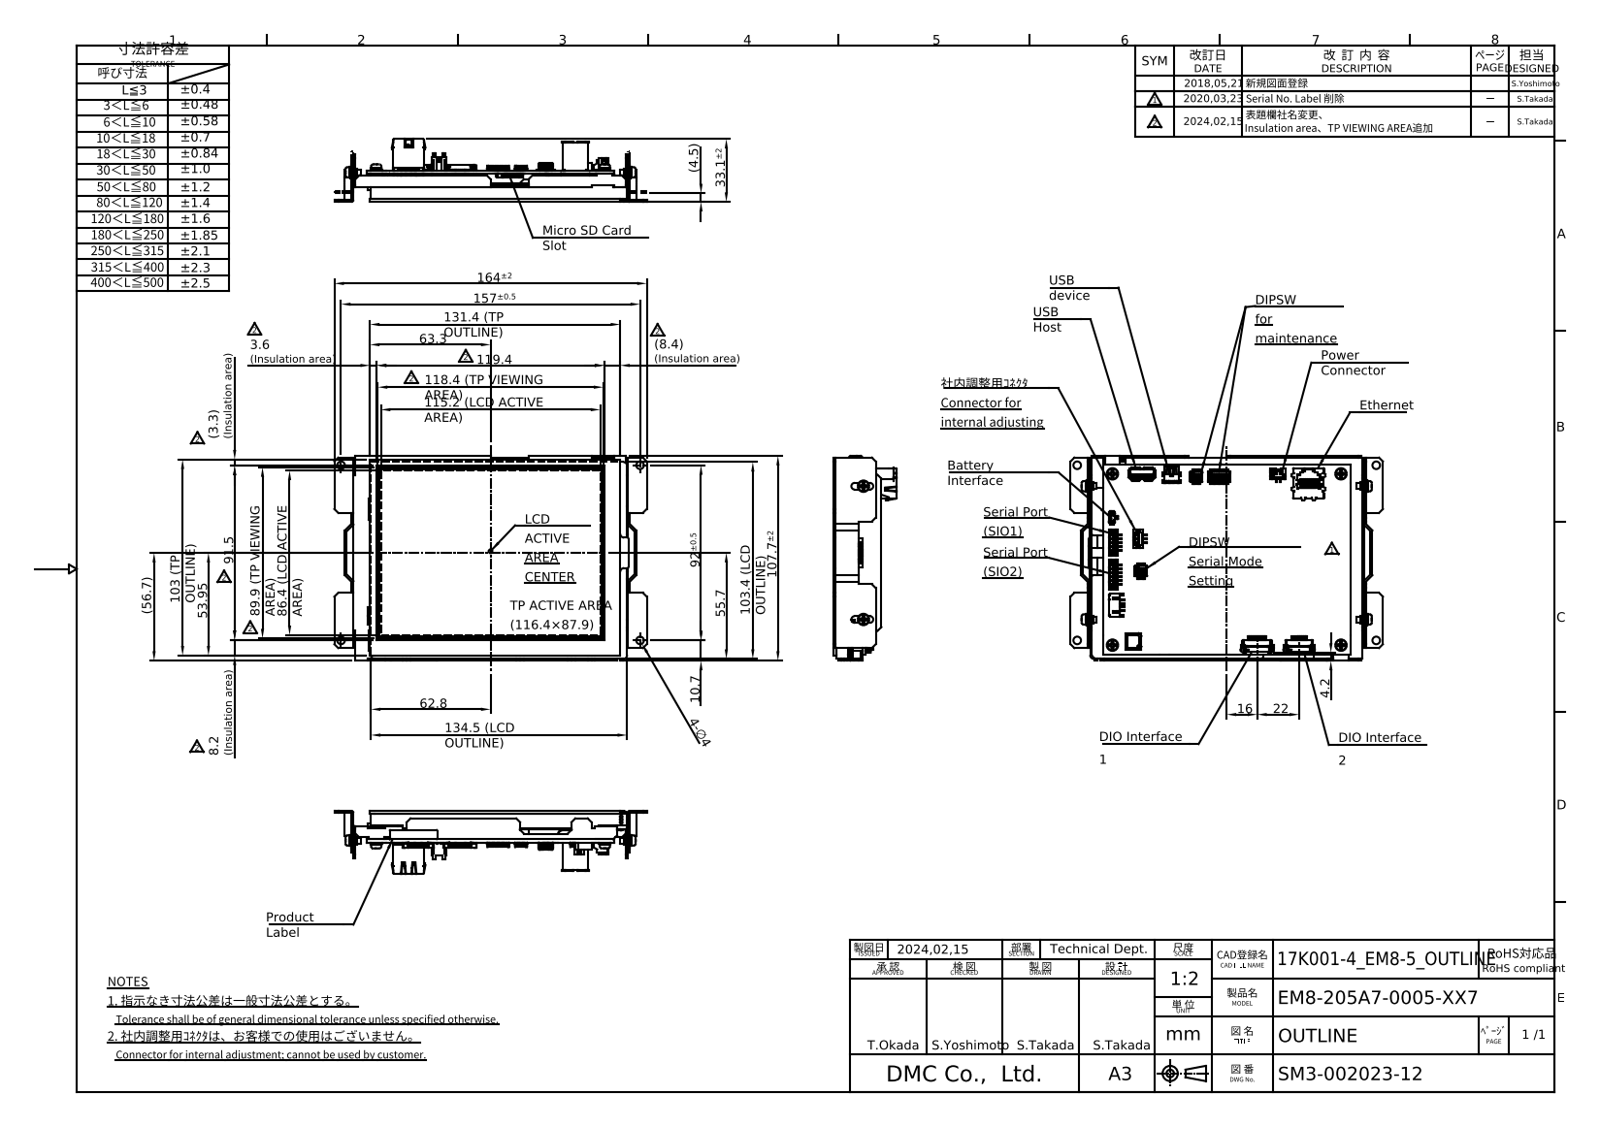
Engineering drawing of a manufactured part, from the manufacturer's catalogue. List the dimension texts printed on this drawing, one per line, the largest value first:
164±2
157±0.5
134.5 (LCD OUTLINE)
131.4 (TP OUTLINE)
119.4
118.4 (TP VIEWING AREA)
115.2 (LCD ACTIVE AREA)
107.7±2
103.4 (LCD OUTLINE)
103 (TP OUTLINE)
92±0.5
91.5
89.9 (TP VIEWING AREA)
86.4 (LCD ACTIVE AREA)
63.3
62.8
(56.7)
55.7
53.95
33.1±2
22
16
10.7
(8.4) (Insulation area)
8.2 (Insulation area)
(4.5)
4.2
4-∅4
3.6 (Insulation area)
(3.3) (Insulation area)
